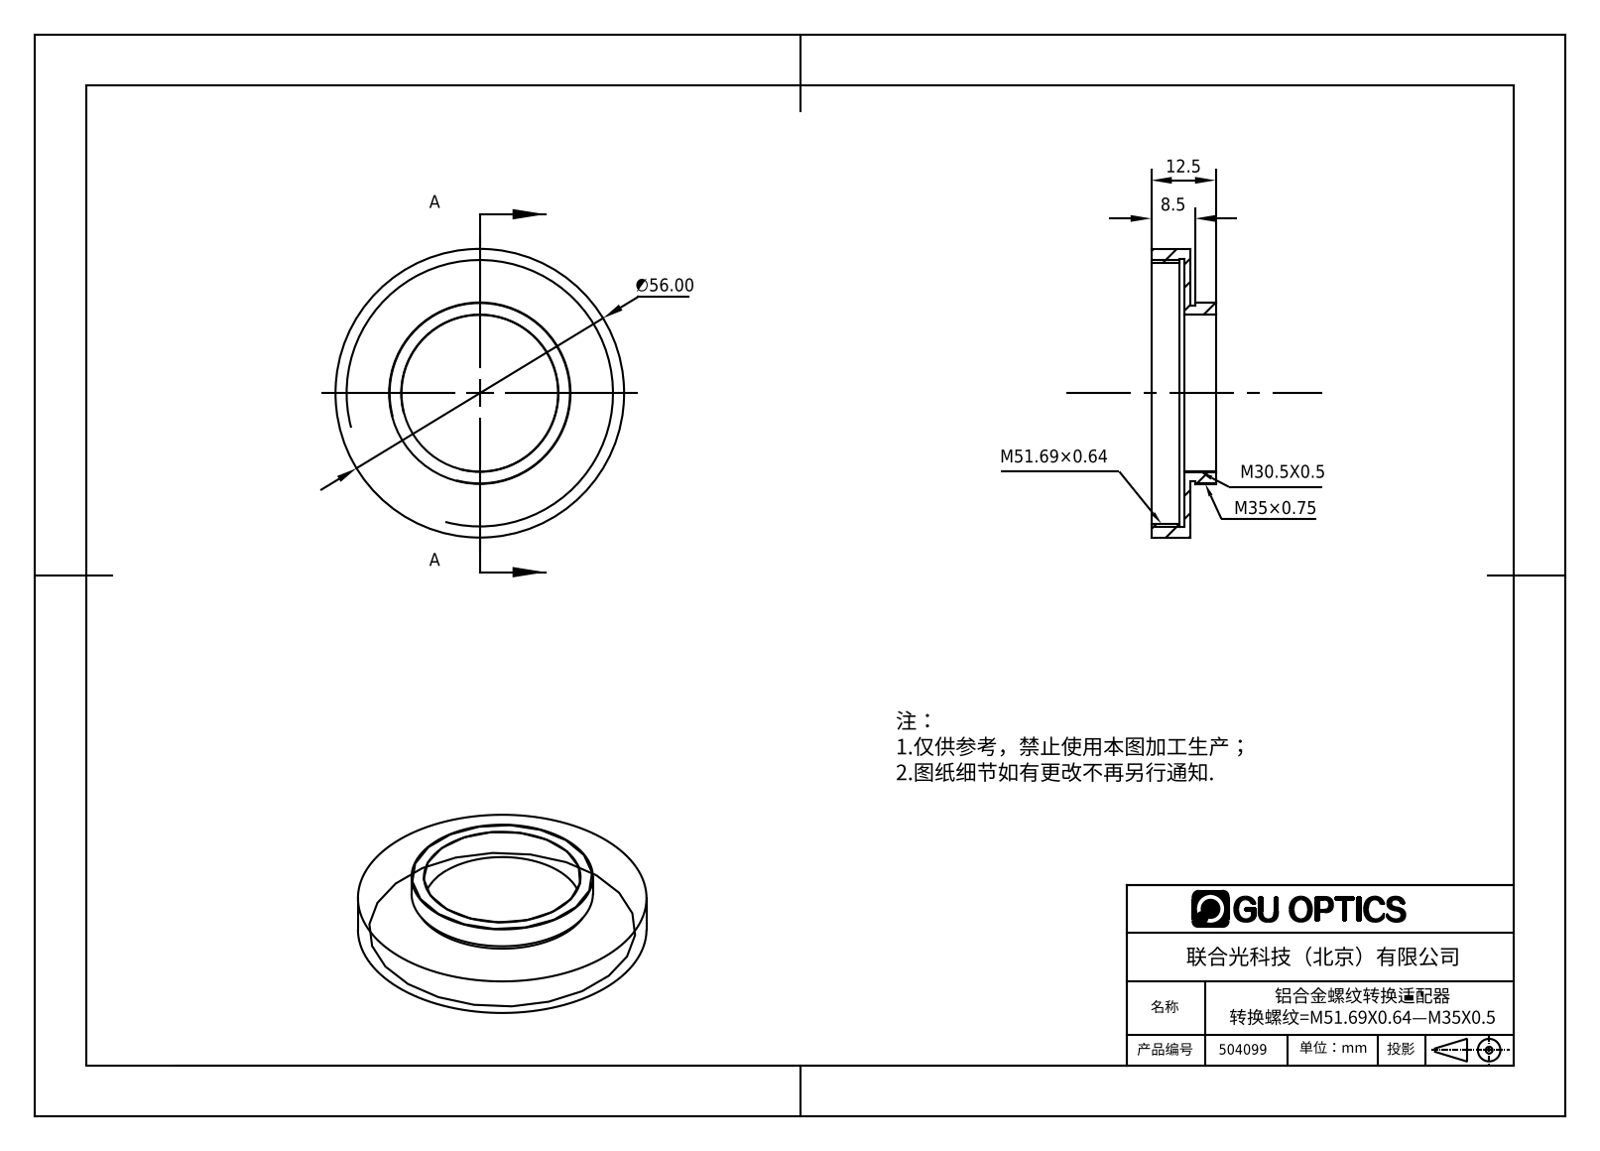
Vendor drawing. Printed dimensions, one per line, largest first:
∅56.00
12.5
8.5
